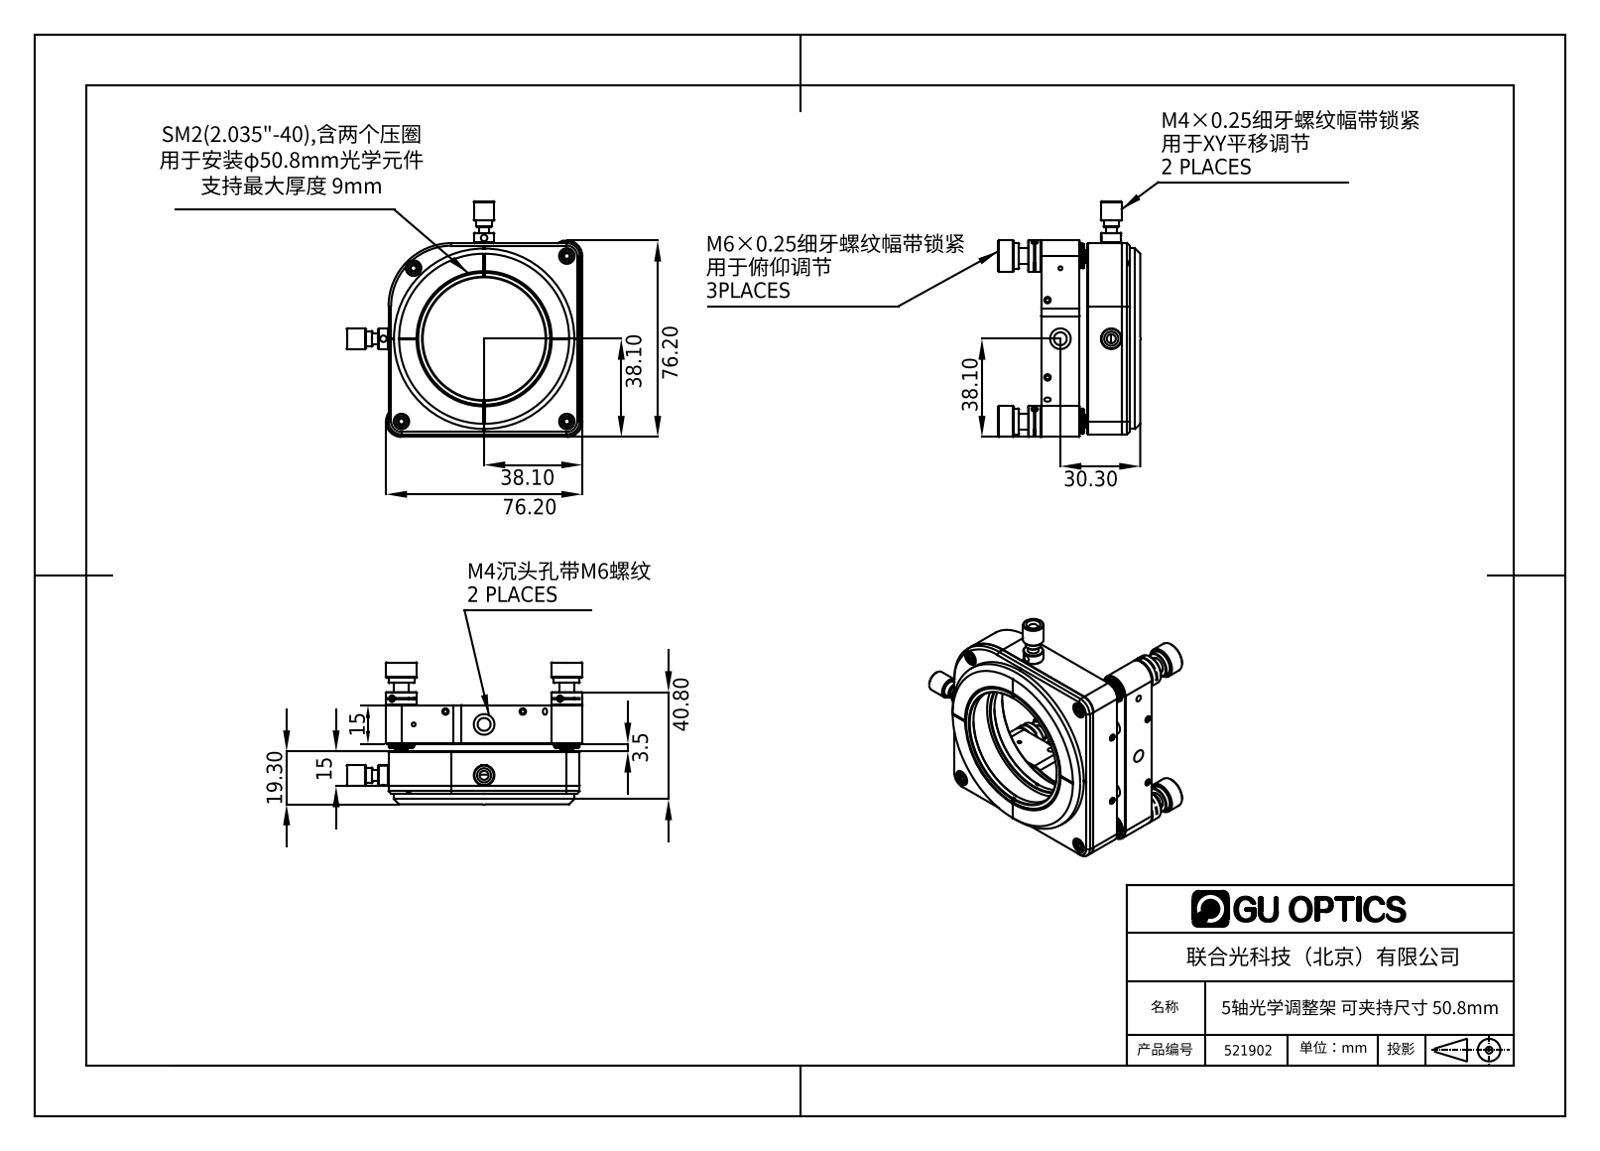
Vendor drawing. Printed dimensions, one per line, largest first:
76.20
76.20
40.80
38.10
38.10
38.10
30.30
19.30
15
15
3.5
